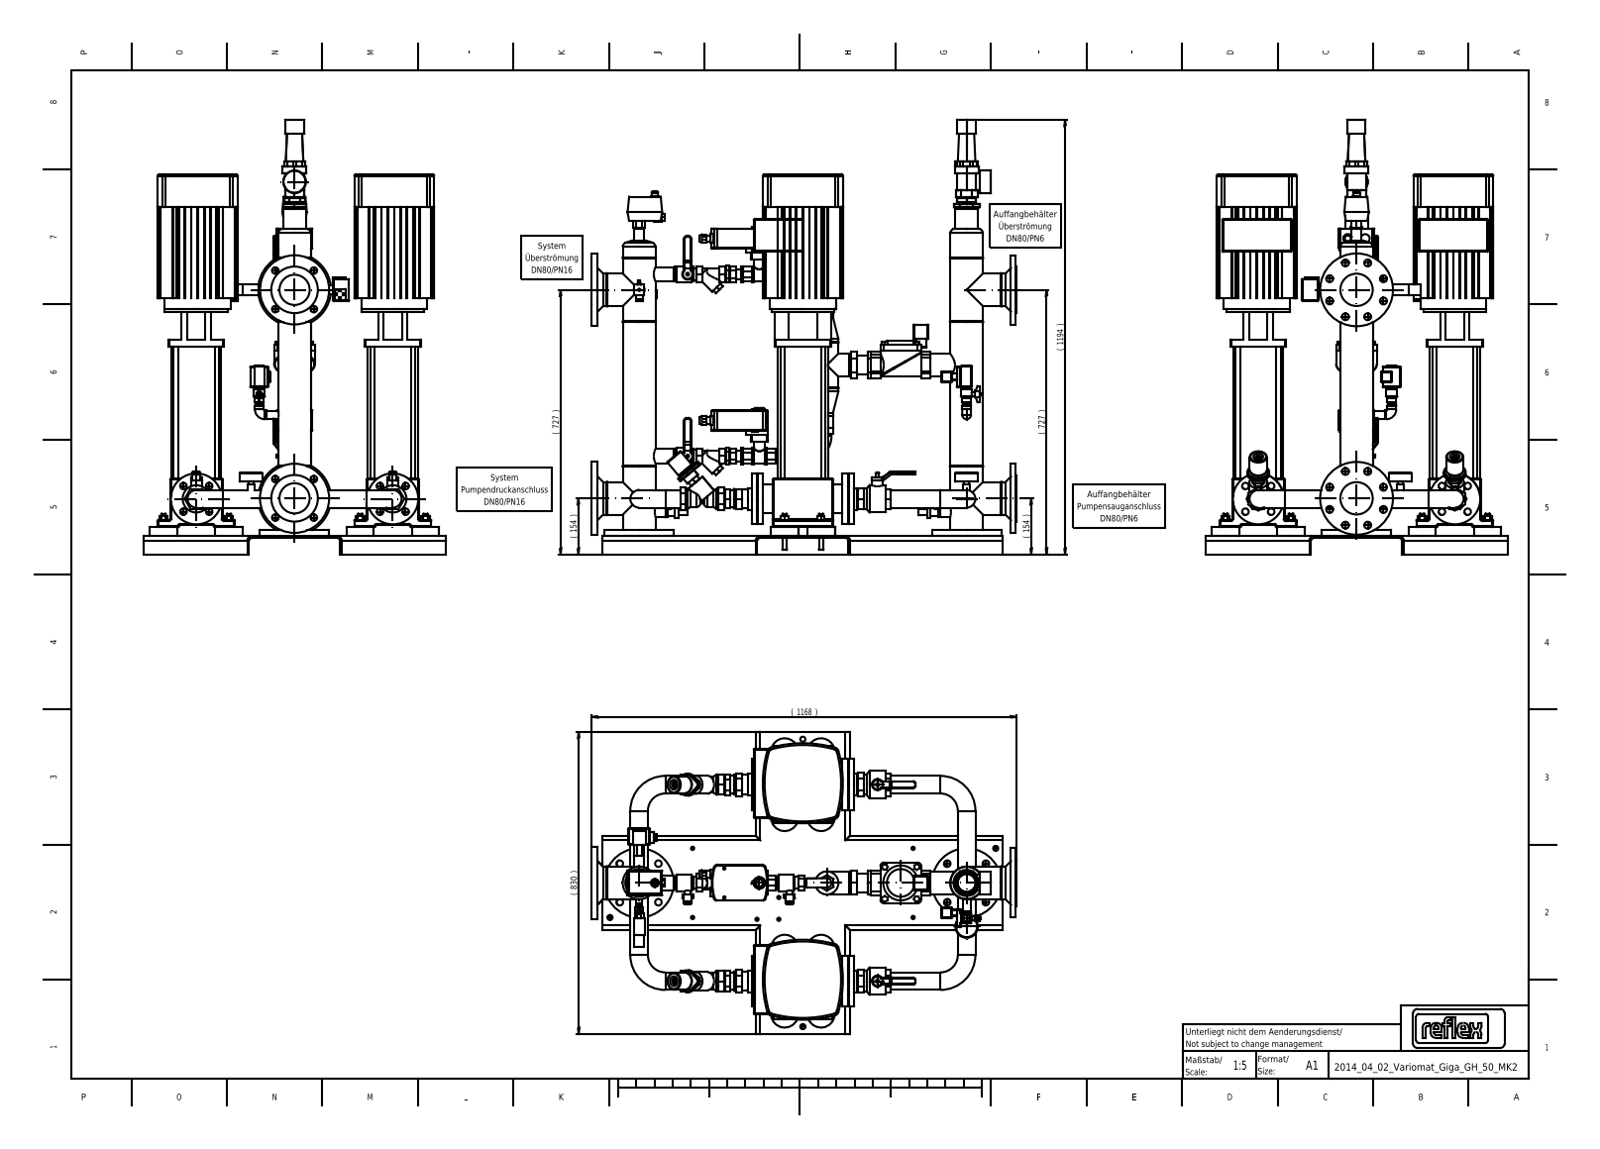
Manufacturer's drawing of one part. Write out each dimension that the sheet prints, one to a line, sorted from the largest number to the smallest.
1194 ( )
1168 ( )
830 ( )
727 ( )
727 ( )
154 ( )
154 ( )
